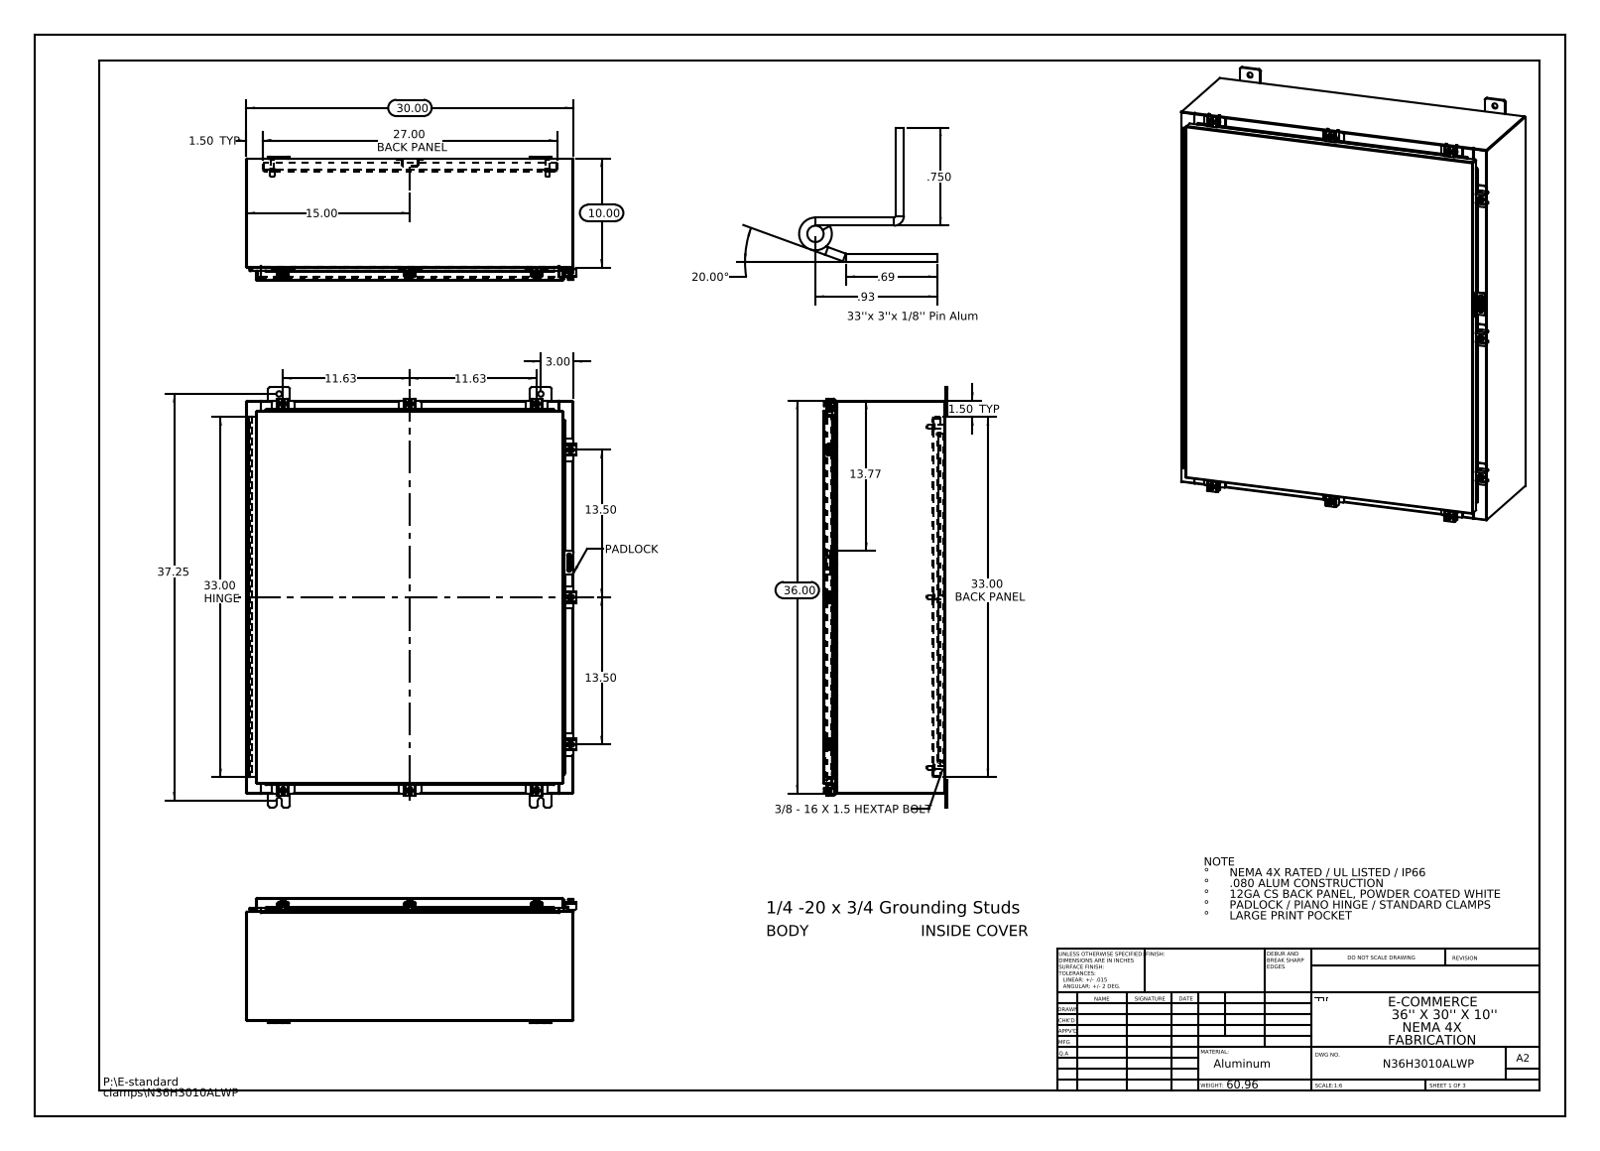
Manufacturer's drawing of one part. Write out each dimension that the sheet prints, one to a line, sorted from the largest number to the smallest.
37.25
36.00
33.00 HINGE
33.00 BACK PANEL
30.00
27.00 BACK PANEL
20.00°
15.00
13.77
13.50
13.50
11.63
11.63
10.00
3.00
1.50 TYP
1.50 TYP
.93
.750
.69
